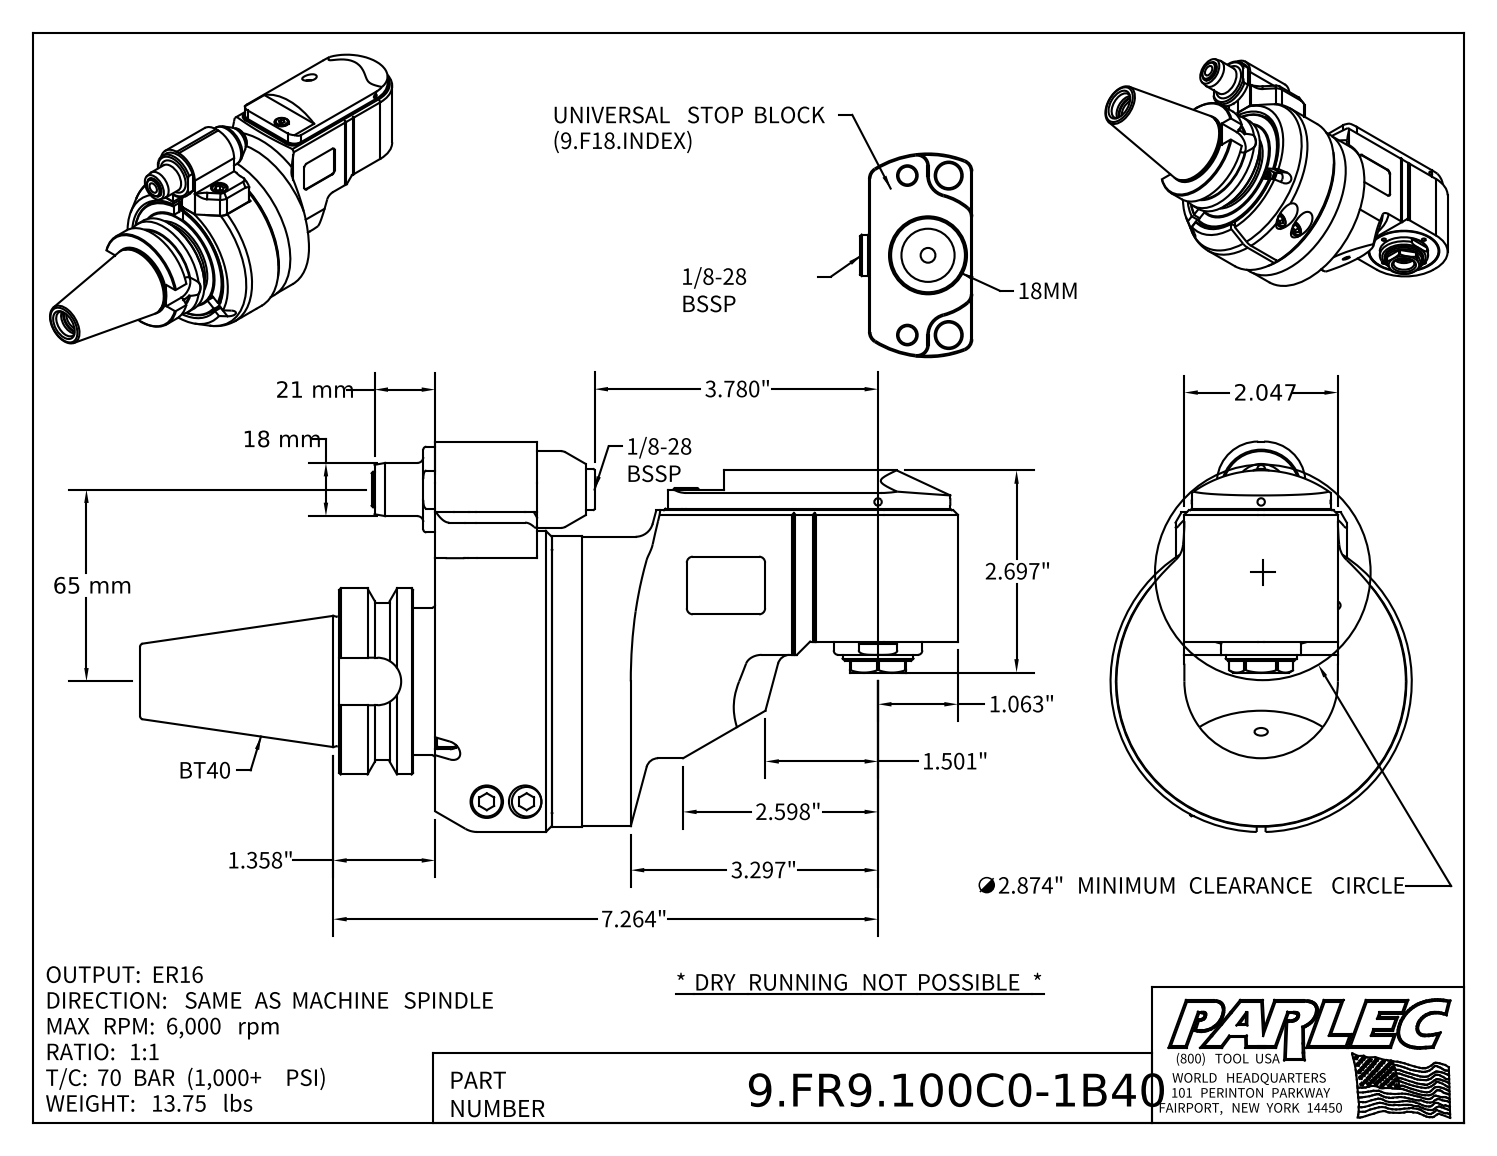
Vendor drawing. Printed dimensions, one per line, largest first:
65 mm
21 mm
18 mm
7.264"
3.780"
3.297"
∅2.874" MINIMUM CLEARANCE CIRCLE
2.697"
2.598"
2.047
1.501"
1.358"
1.063"
